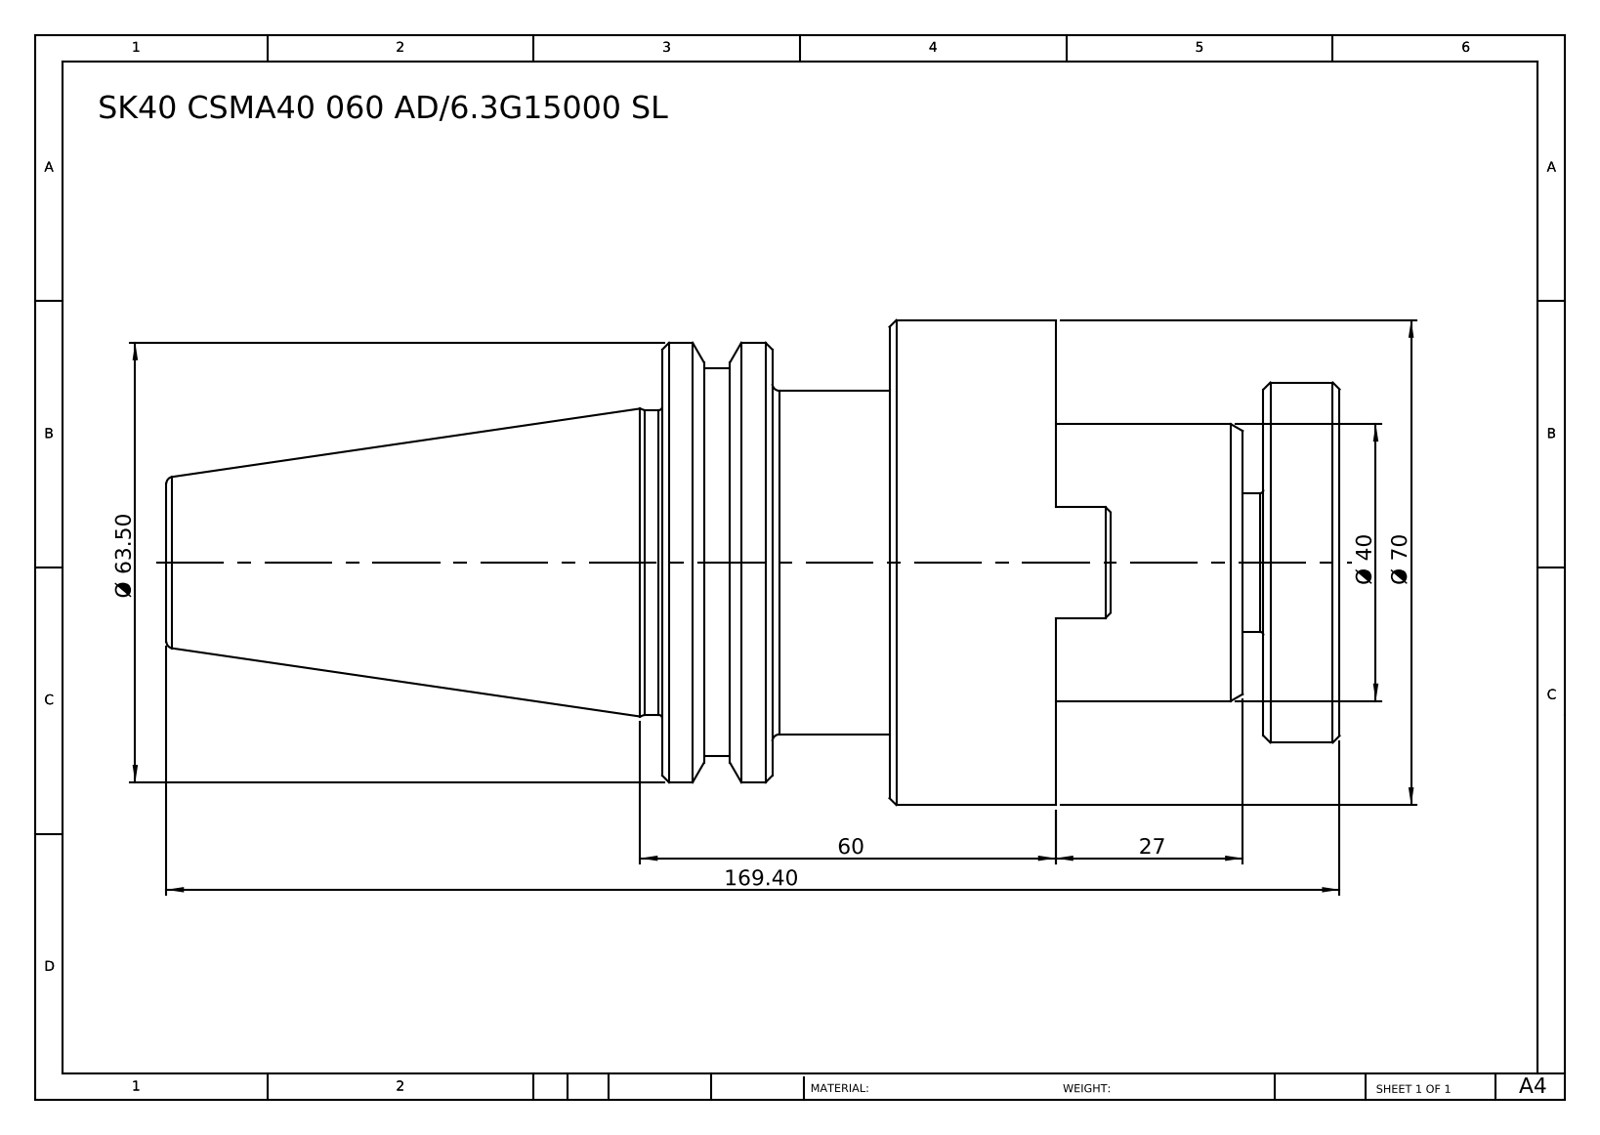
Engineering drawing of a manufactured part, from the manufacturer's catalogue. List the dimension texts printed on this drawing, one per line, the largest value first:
169.40
Ø 70
Ø 63.50
60
Ø 40
27
